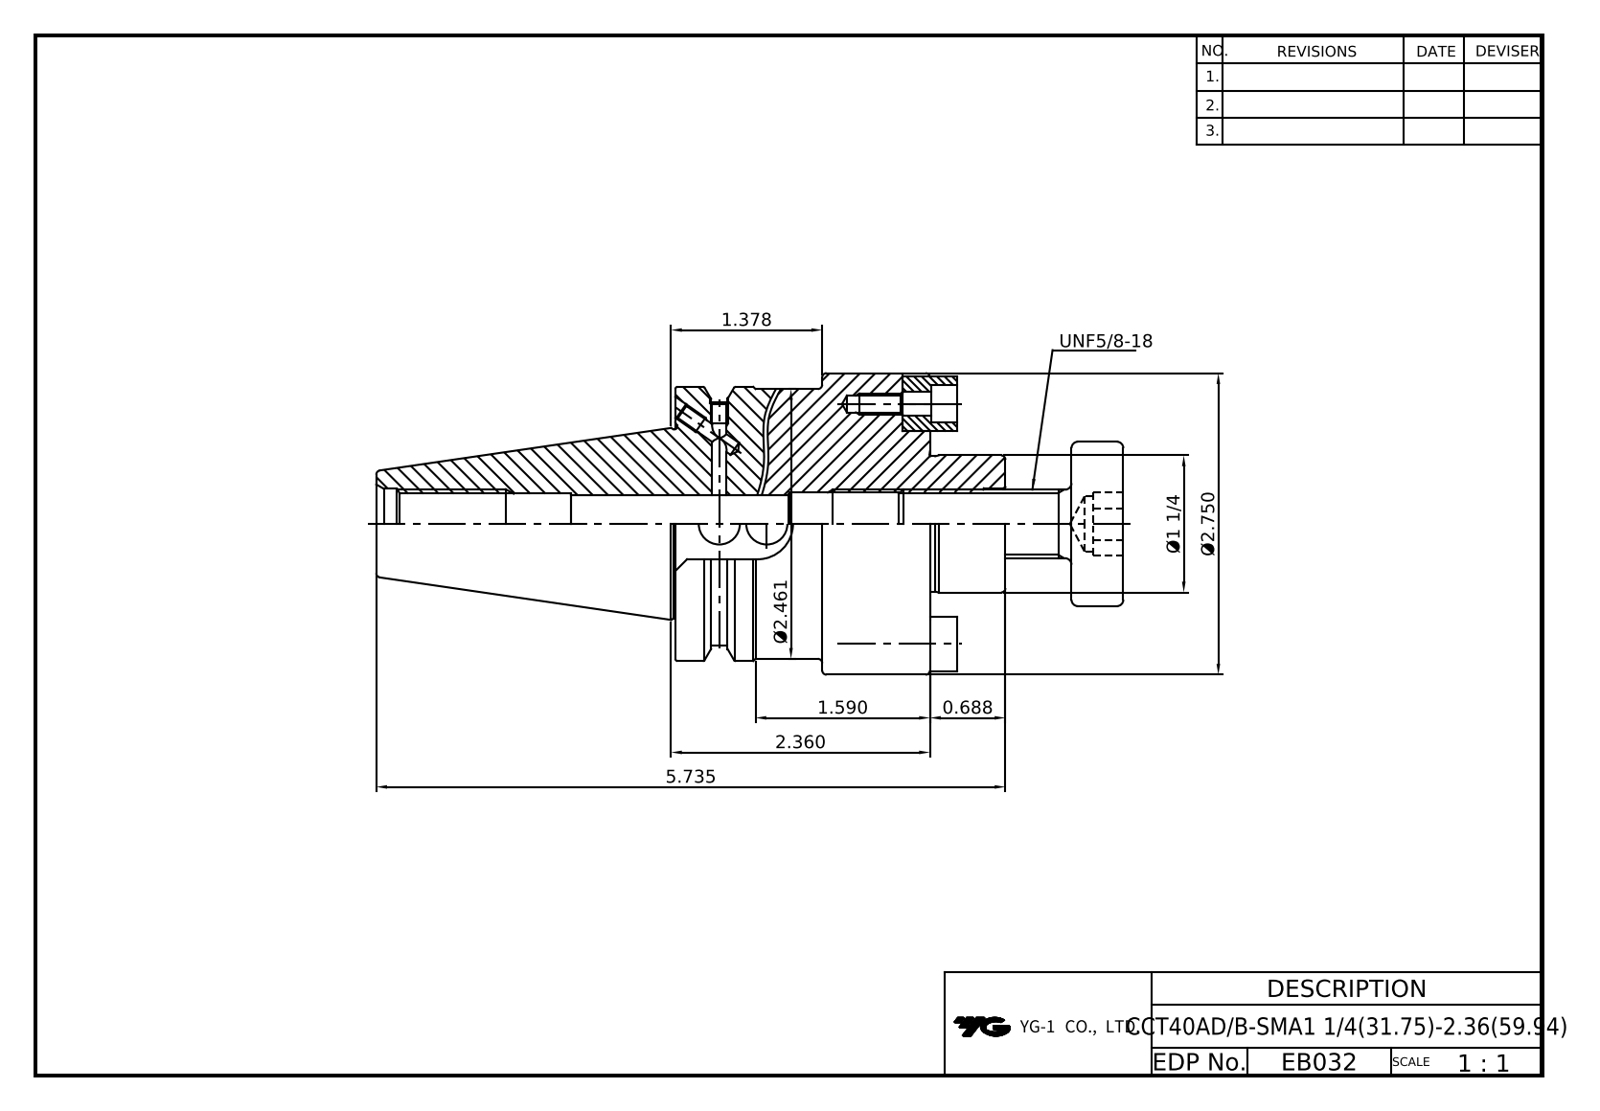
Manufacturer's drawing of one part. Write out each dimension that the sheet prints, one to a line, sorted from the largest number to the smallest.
5.735
Ø2.750
Ø2.461
2.360
1.590
1.378
Ø1 1/4
0.688
